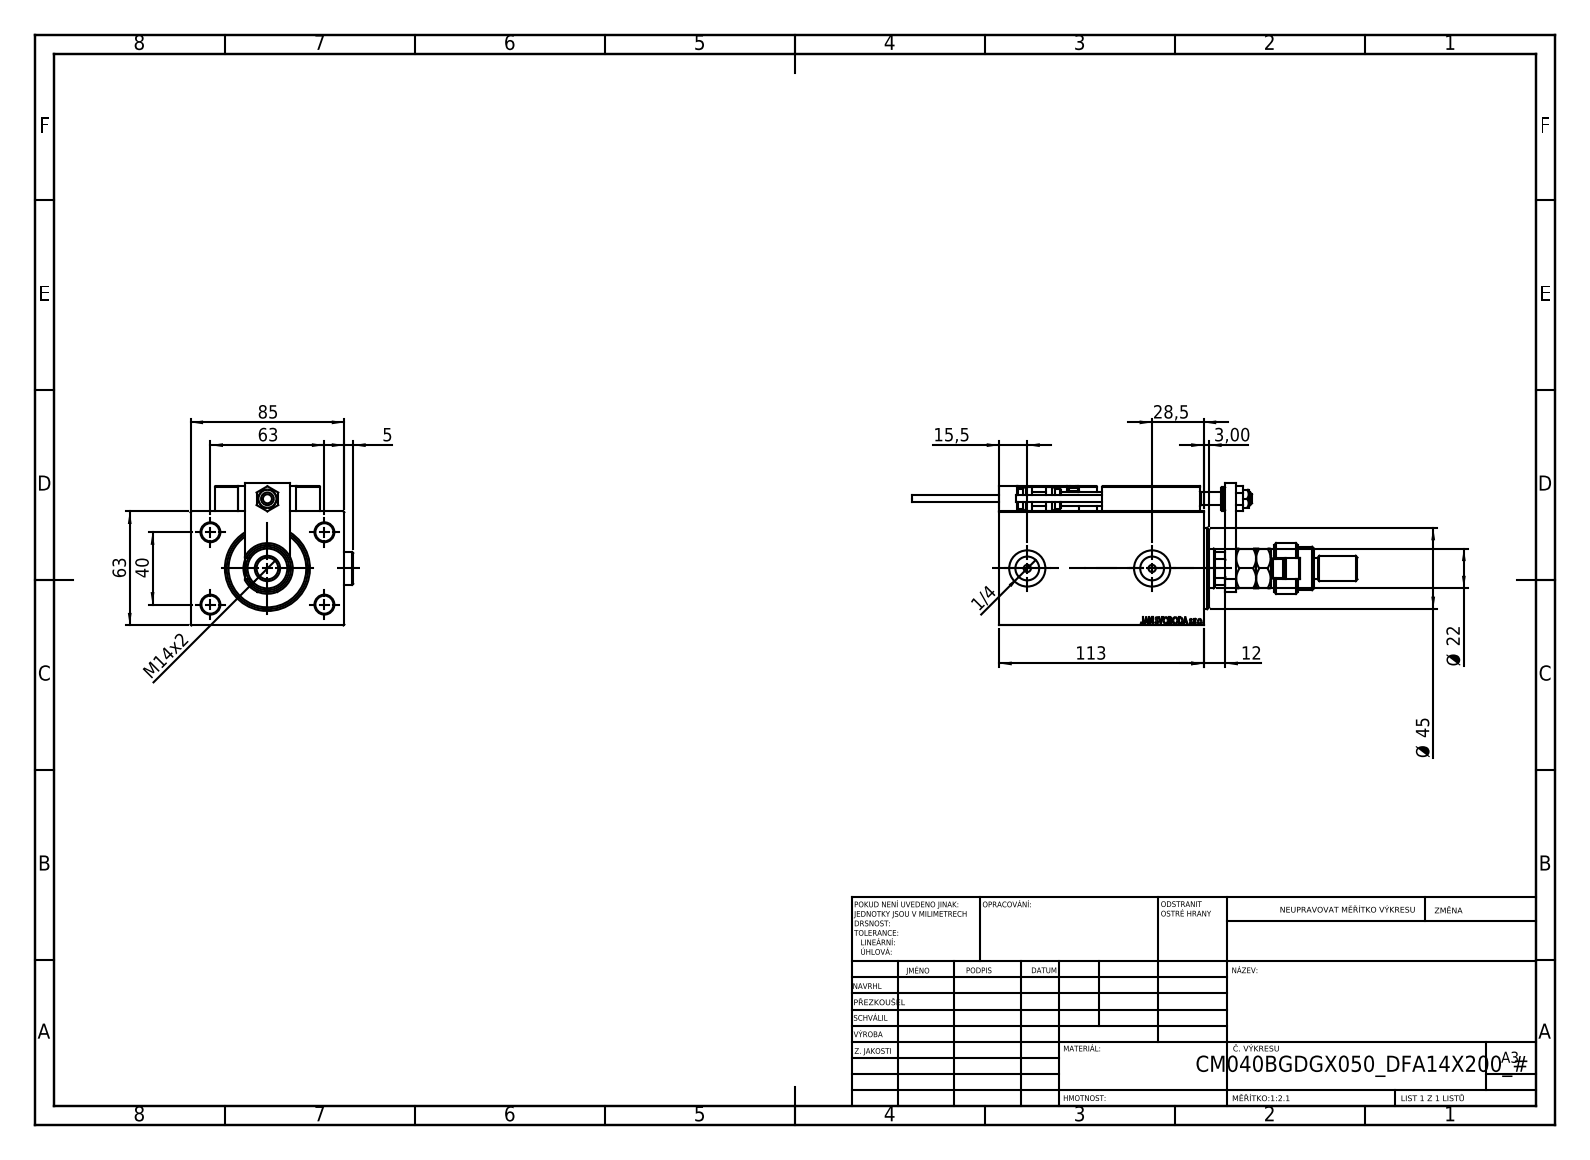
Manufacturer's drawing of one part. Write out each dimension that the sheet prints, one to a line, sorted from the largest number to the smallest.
113
85
63
63
Ø 45
40
28,5
Ø 22
15,5
M14x2
12
5
3,00
1/4
